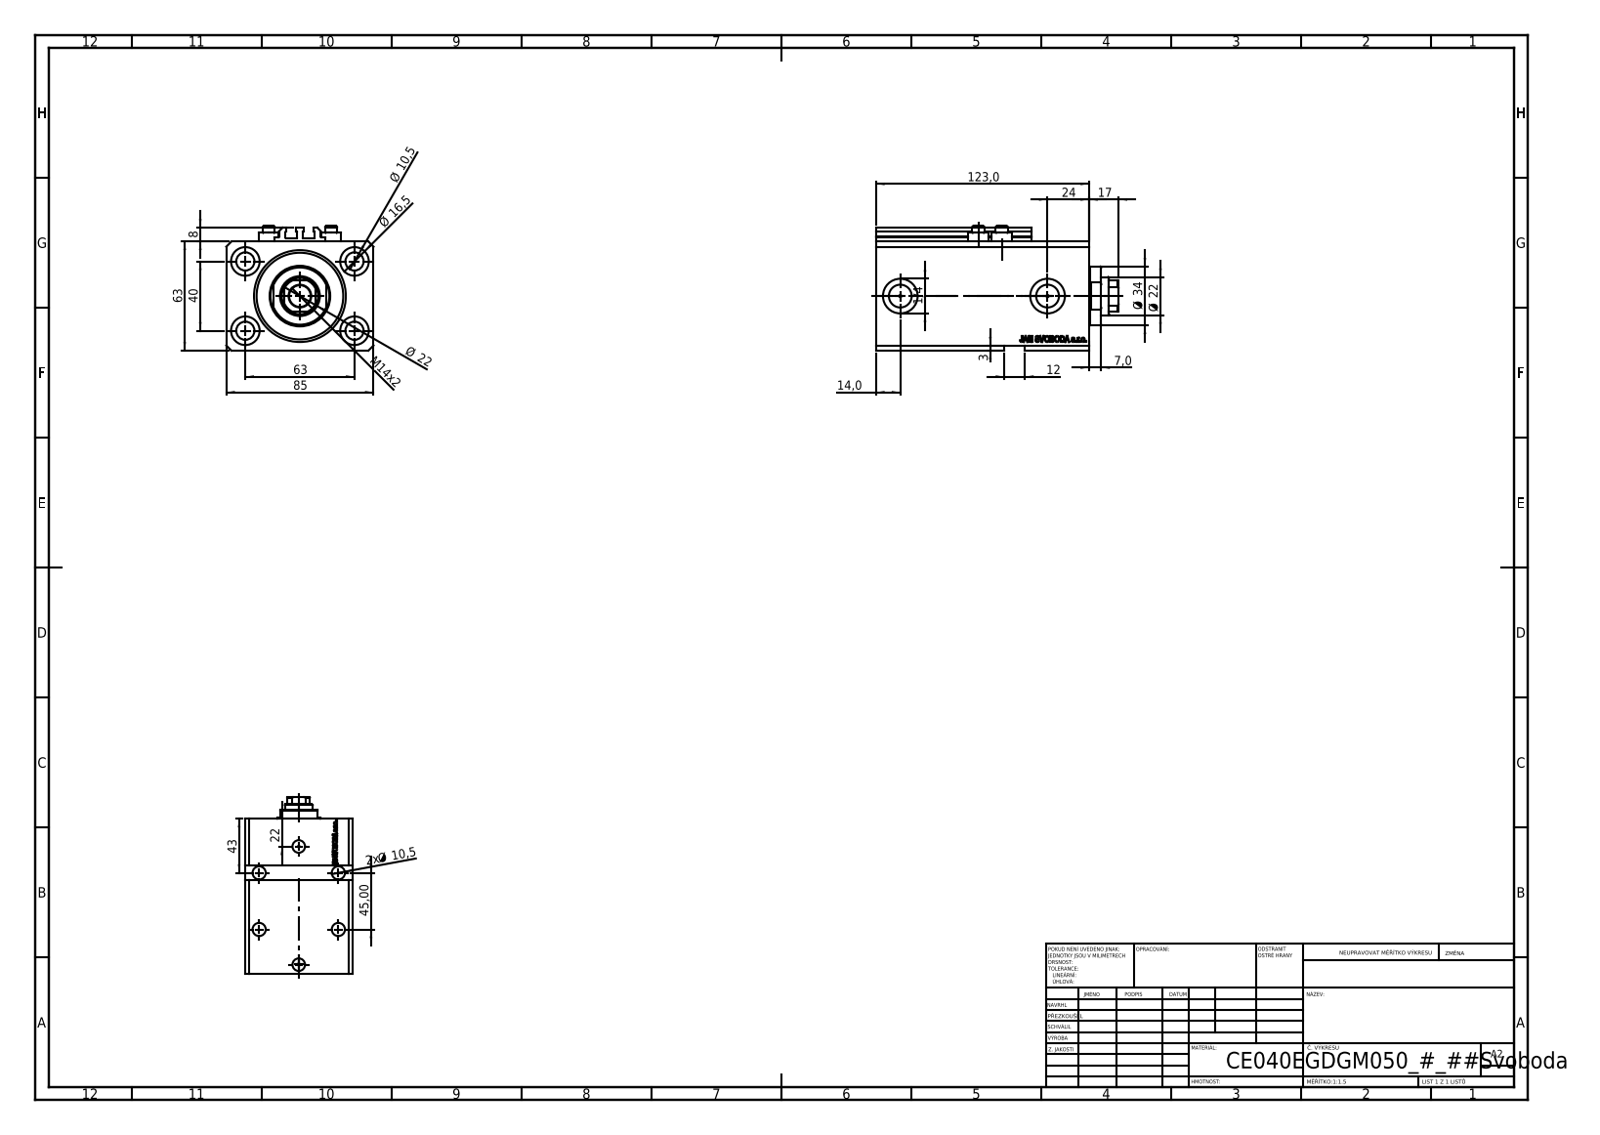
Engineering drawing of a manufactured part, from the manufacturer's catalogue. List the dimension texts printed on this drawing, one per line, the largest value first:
123,0
85
63
63
45,00
43
40
Ø 34
24
Ø 22
Ø 22
22
17
Ø 16,5
M14x2
14,0
12
Ø 10,5
2x Ø 10,5
8
7,0
3
1/4
